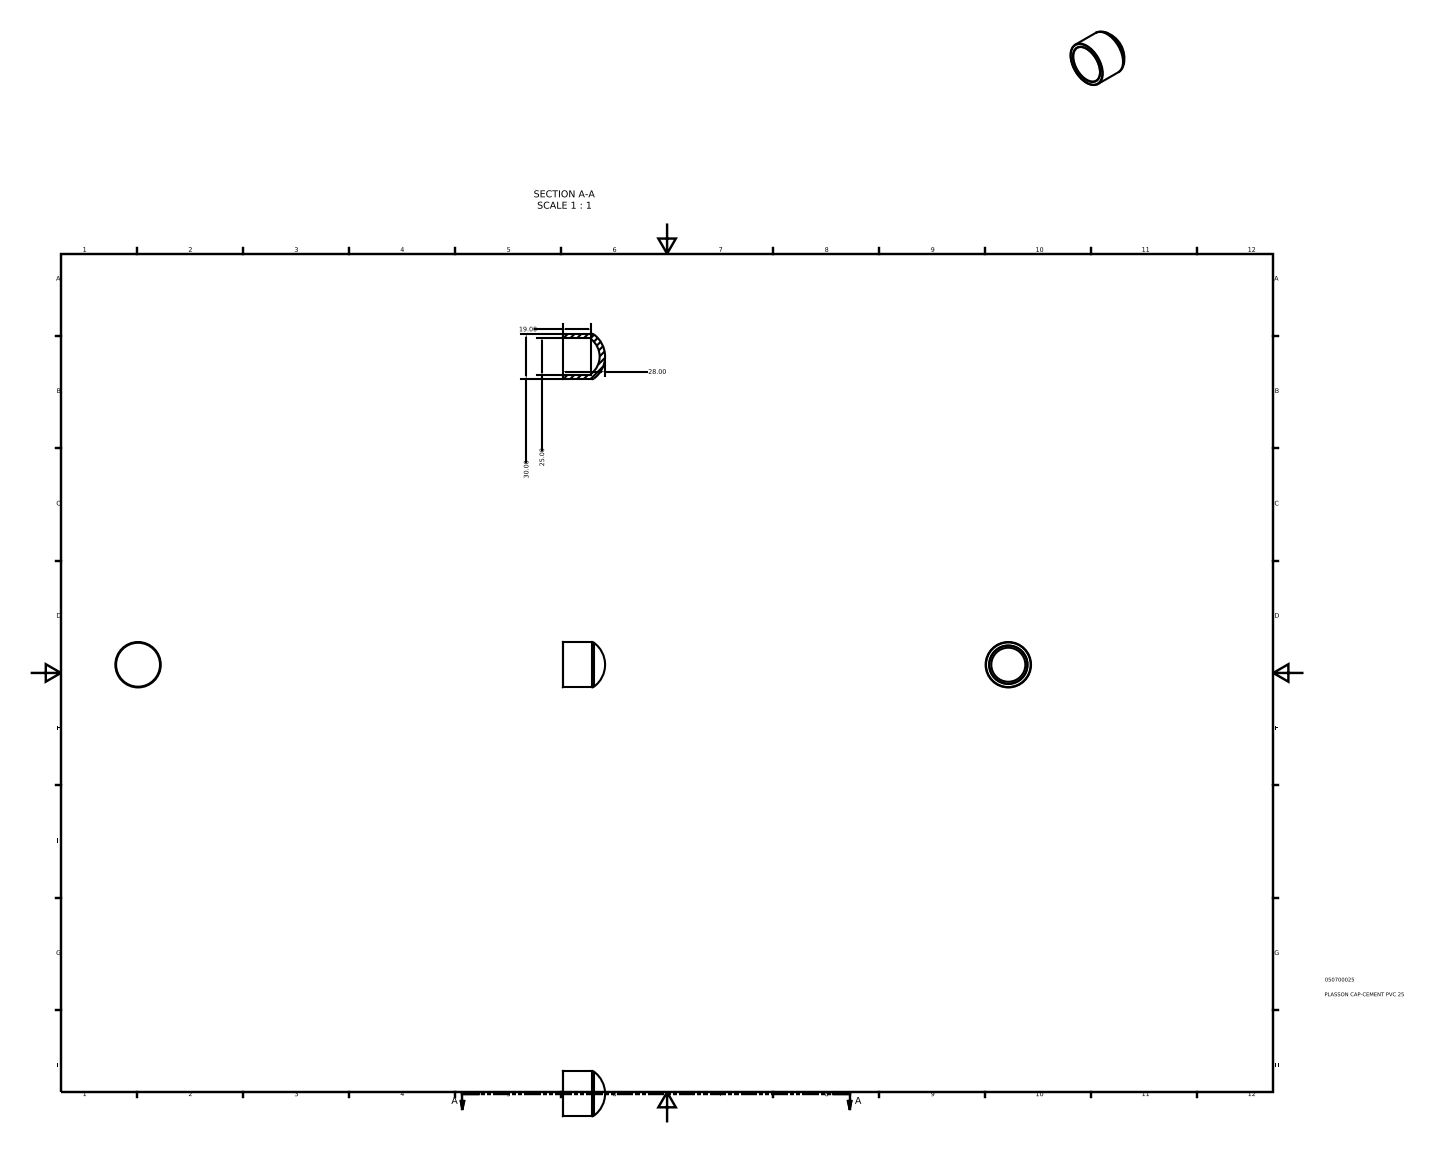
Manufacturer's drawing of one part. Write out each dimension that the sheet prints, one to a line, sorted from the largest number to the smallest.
30.00
28.00
25.00
19.00
